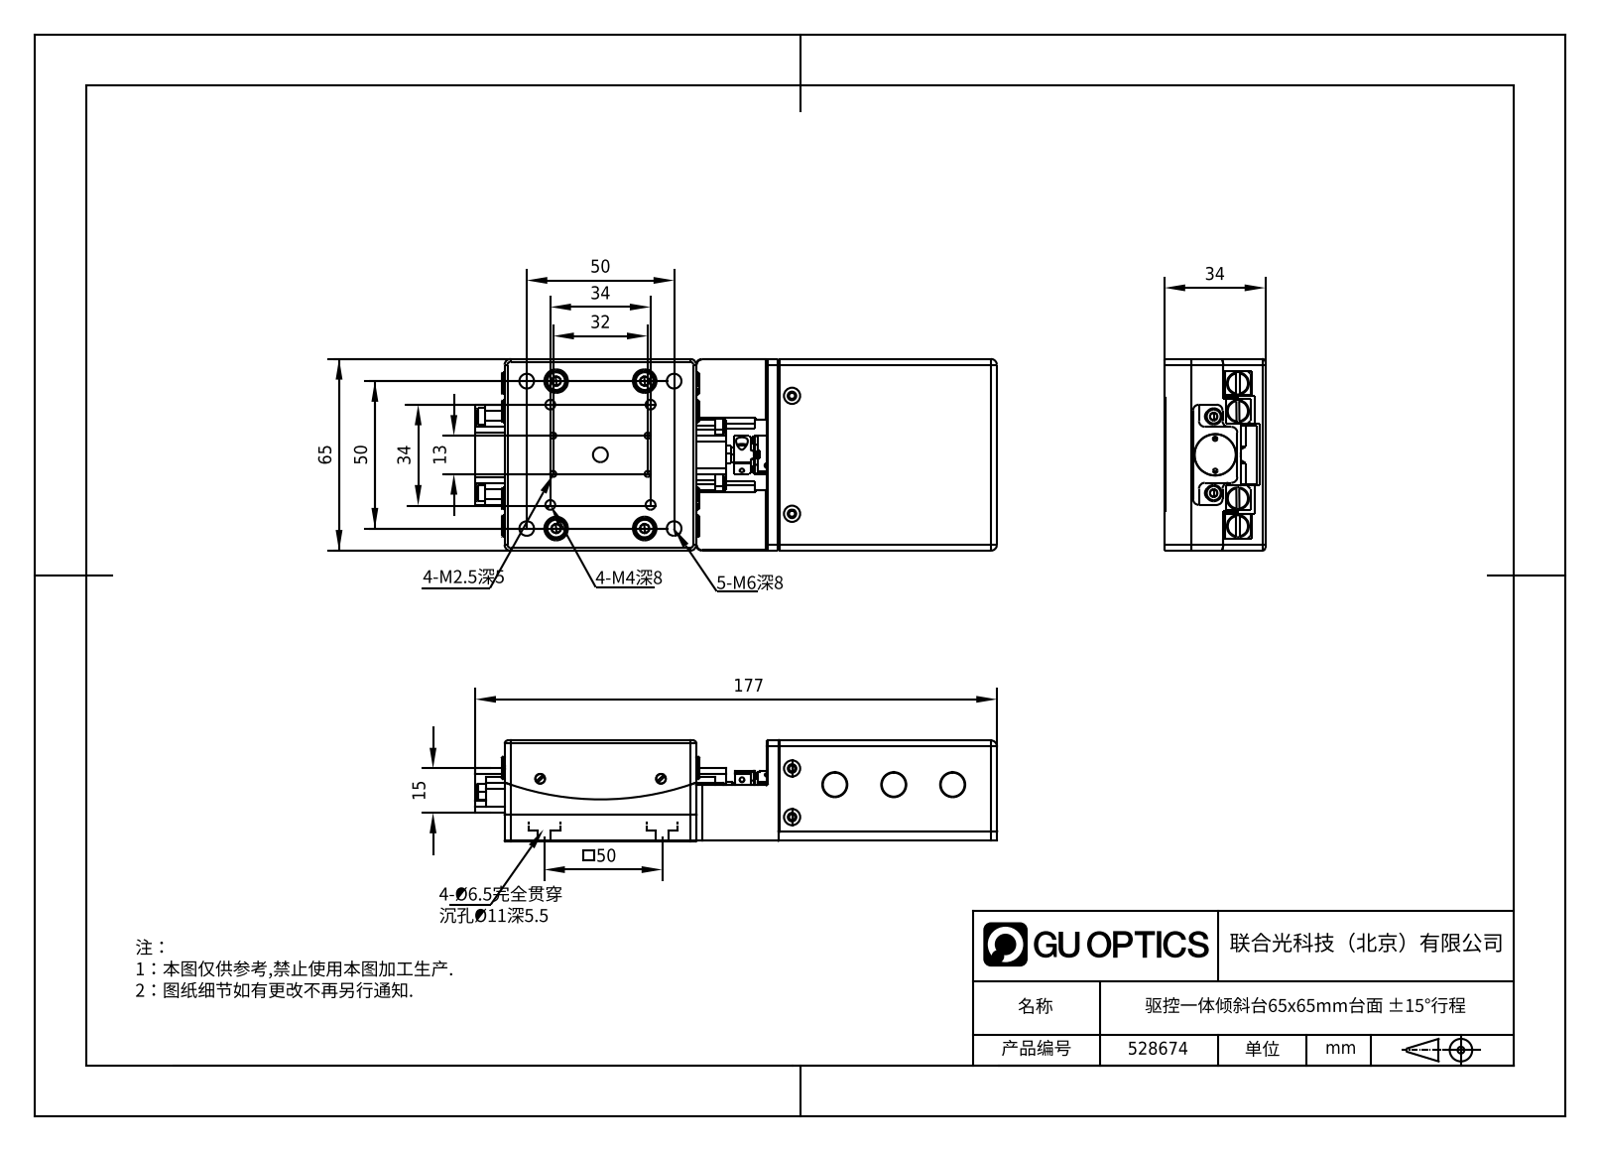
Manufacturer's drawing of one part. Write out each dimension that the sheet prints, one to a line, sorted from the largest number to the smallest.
177
65
50
50
50
34
34
34
32
15
13
